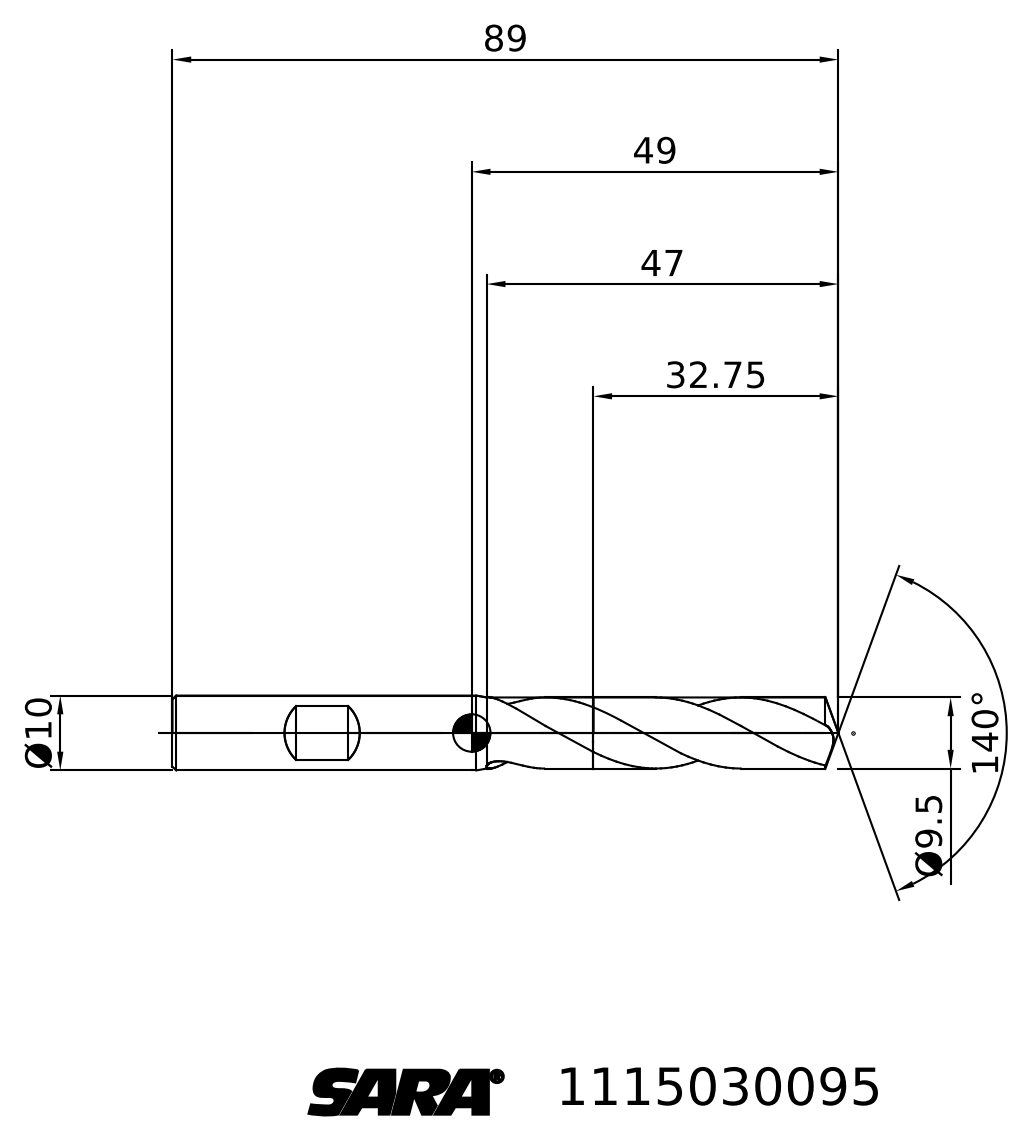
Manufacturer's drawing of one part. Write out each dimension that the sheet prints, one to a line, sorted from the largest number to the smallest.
140°
89
49
47
32.75
Ø10
Ø9.5
